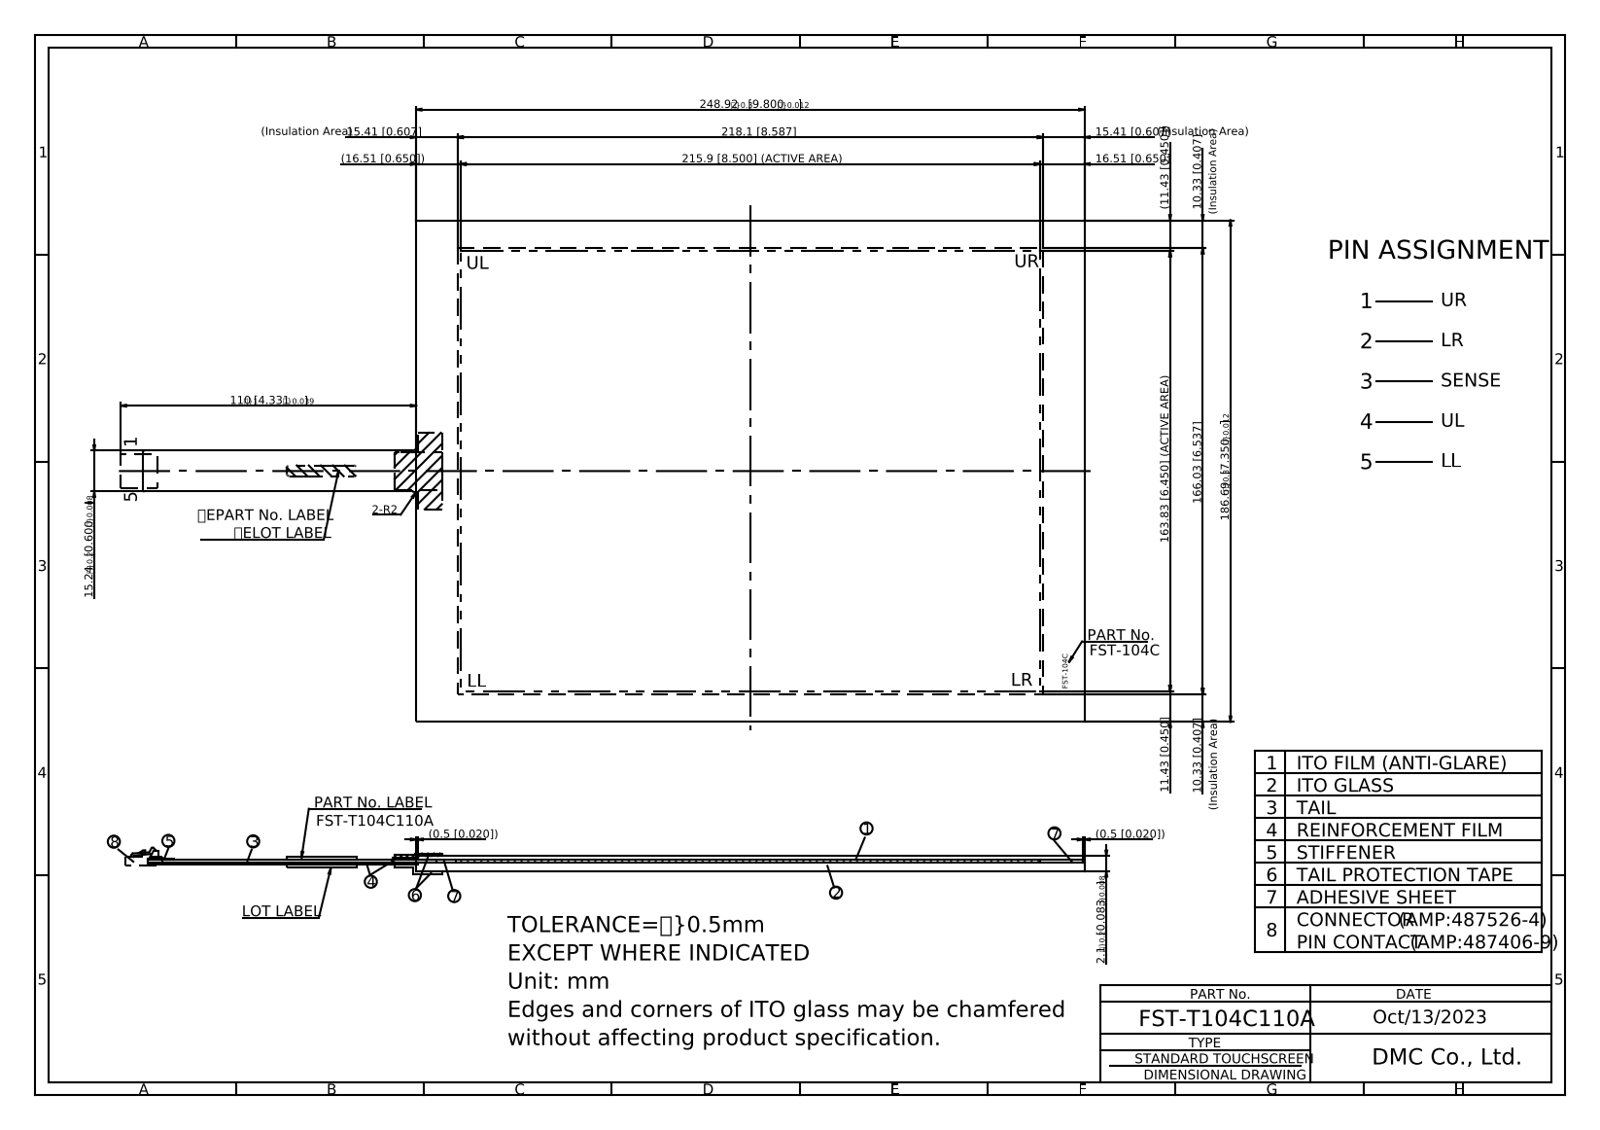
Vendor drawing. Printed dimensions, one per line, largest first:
248.92
218.1 [8.587]
215.9 [8.500] (ACTIVE AREA)
186.69
166.03 [6.537]
163.83 [6.450] (ACTIVE AREA)
110.00
16.51 [0.650]
(16.51 [0.650])
15.41 [0.607]
15.41 [0.607]
15.24
11.43 [0.450]
(11.43 [0.450])
10.33 [0.407]
10.33 [0.407]
2.1{\H0.6667x;?}0.2} [0.083{\H0.6667x;?}0.008}]
(0.5 [0.020])
(0.5 [0.020])
